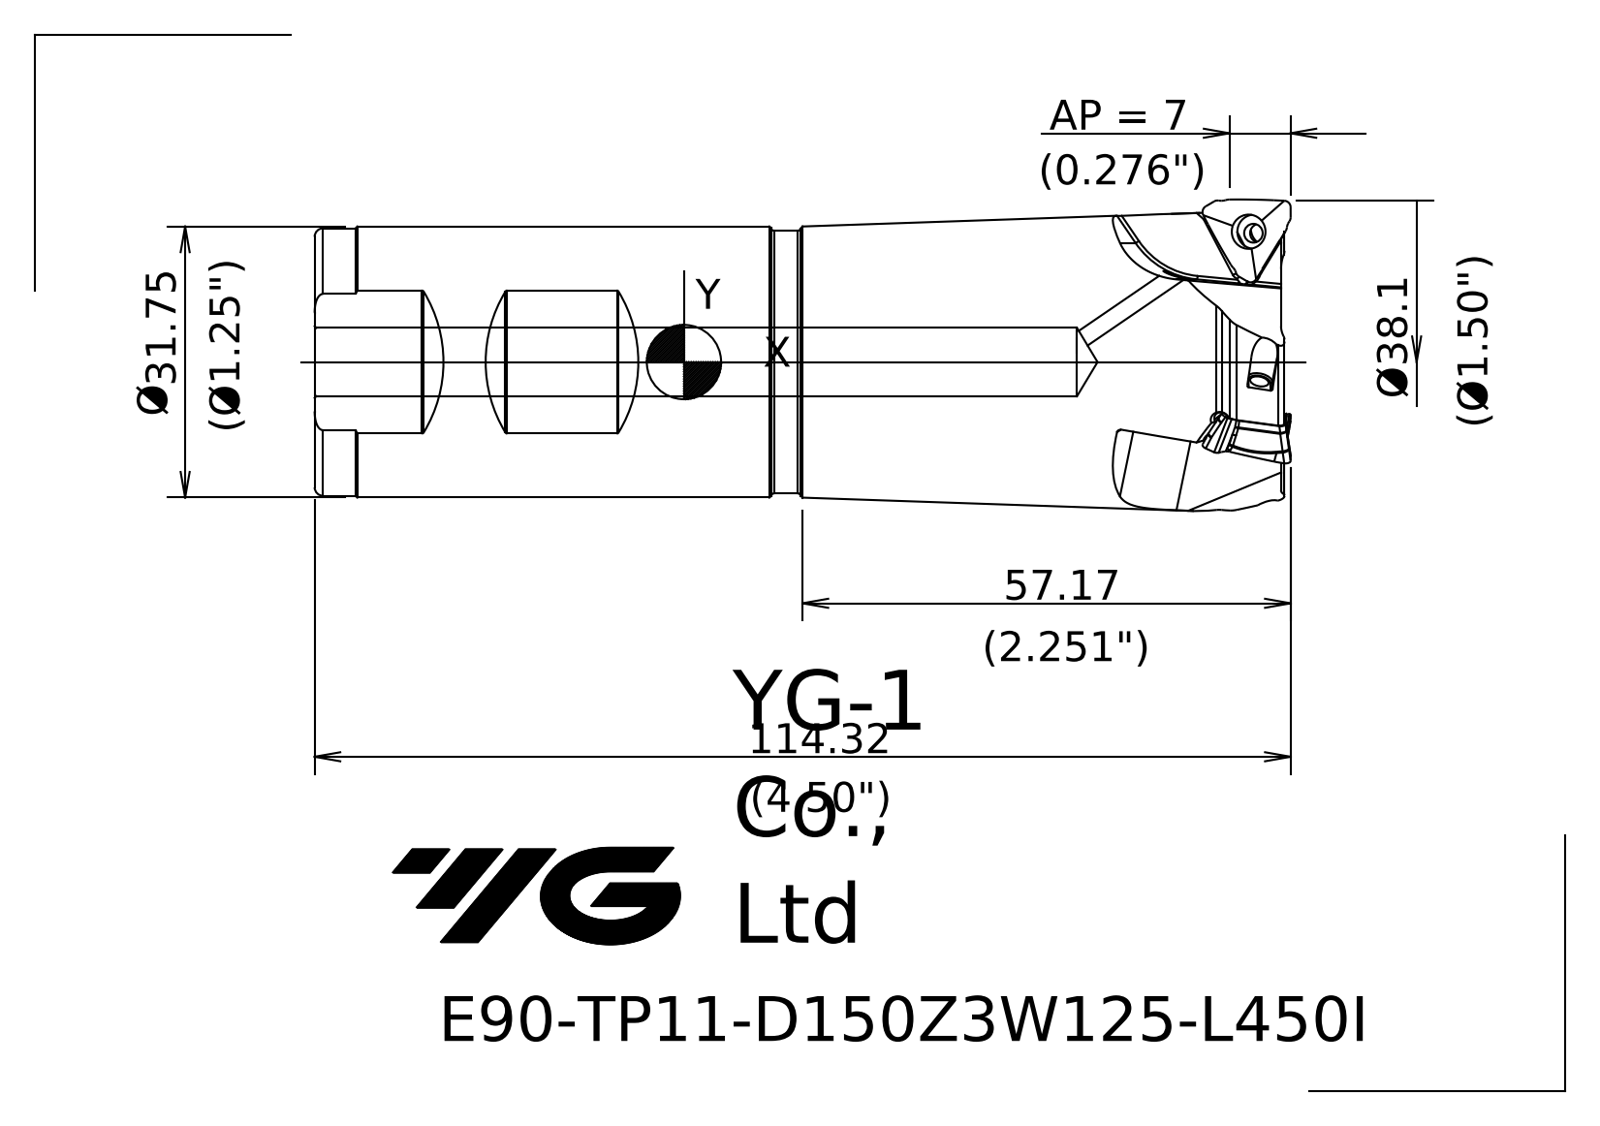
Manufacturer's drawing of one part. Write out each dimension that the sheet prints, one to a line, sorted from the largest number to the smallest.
114.32
57.17
Ø 31.75
AP = 7
